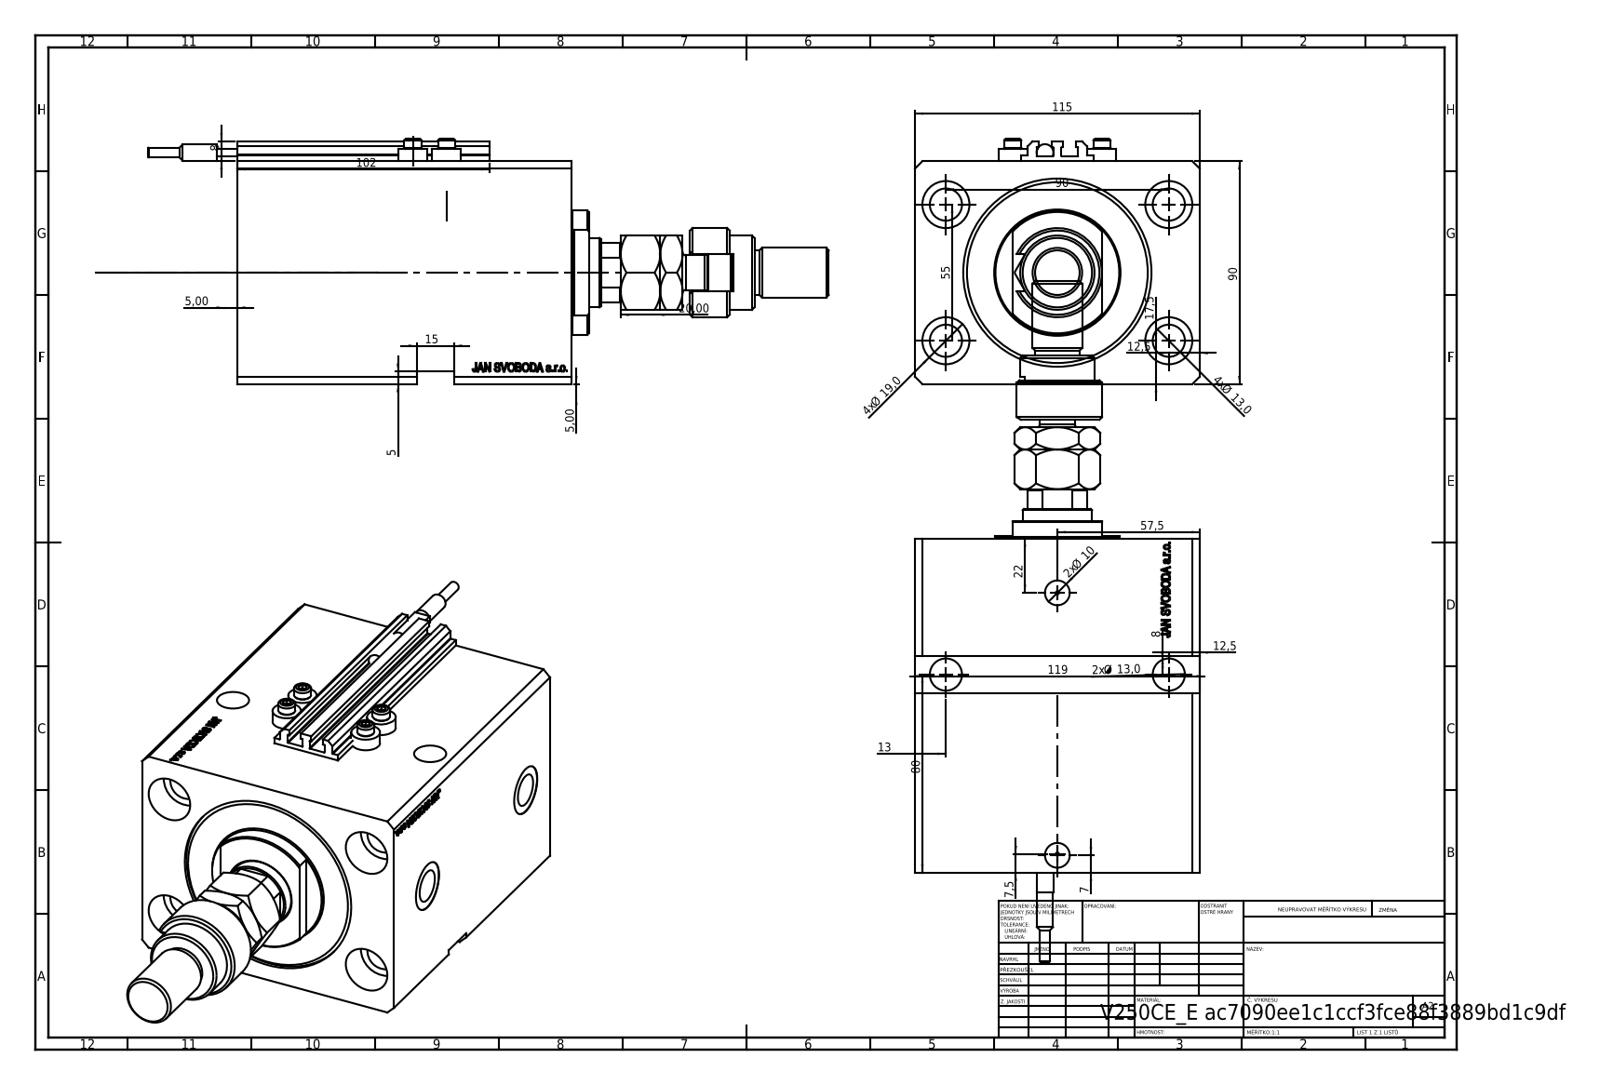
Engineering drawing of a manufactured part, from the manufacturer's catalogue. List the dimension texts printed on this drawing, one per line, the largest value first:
119
115
102
90
90
80
57,5
55
22
20,00
4x Ø 19,0
17,5
15
4x Ø 13,0
2x Ø 13,0
13
12,5
12,5
2x Ø 10
8
8
7,5
7
5,00
5,00
5
